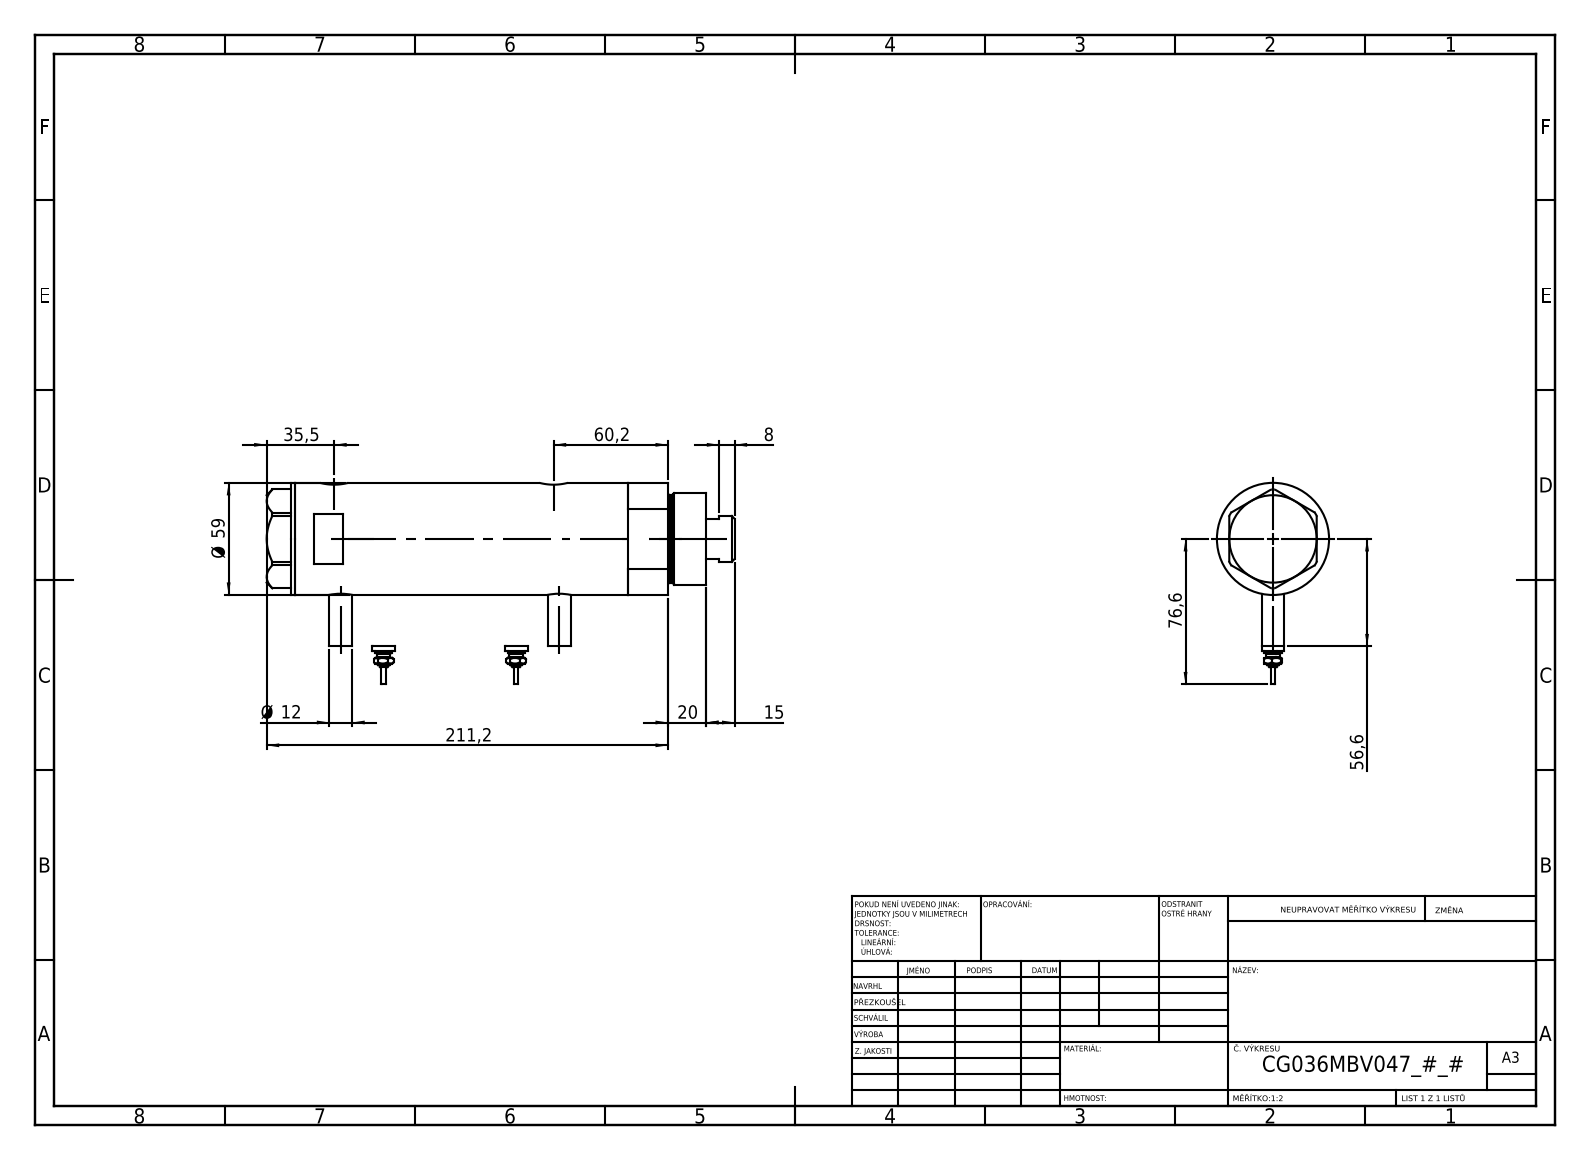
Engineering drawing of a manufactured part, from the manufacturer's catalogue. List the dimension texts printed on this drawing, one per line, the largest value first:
211,2
76,6
60,2
Ø 59
56,6
35,5
20
15
Ø 12
8
